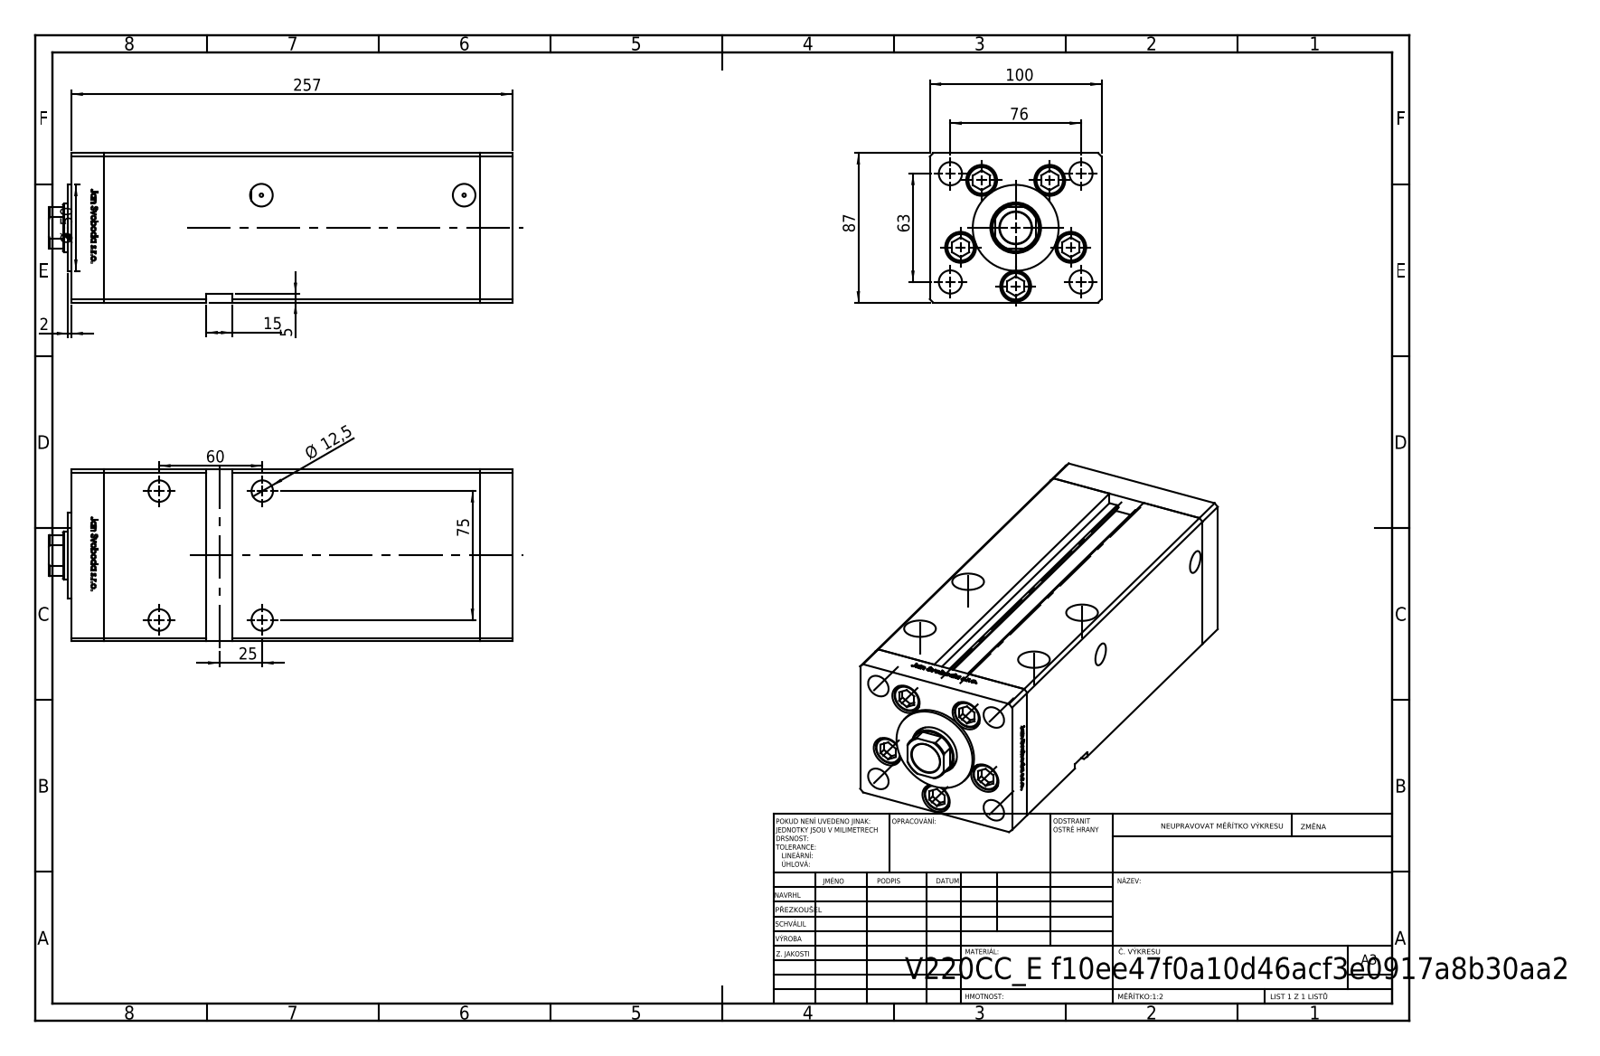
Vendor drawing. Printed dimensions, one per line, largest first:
257
100
87
76
75
63
60
Ø 50
25
15
Ø 12,5
5
2
